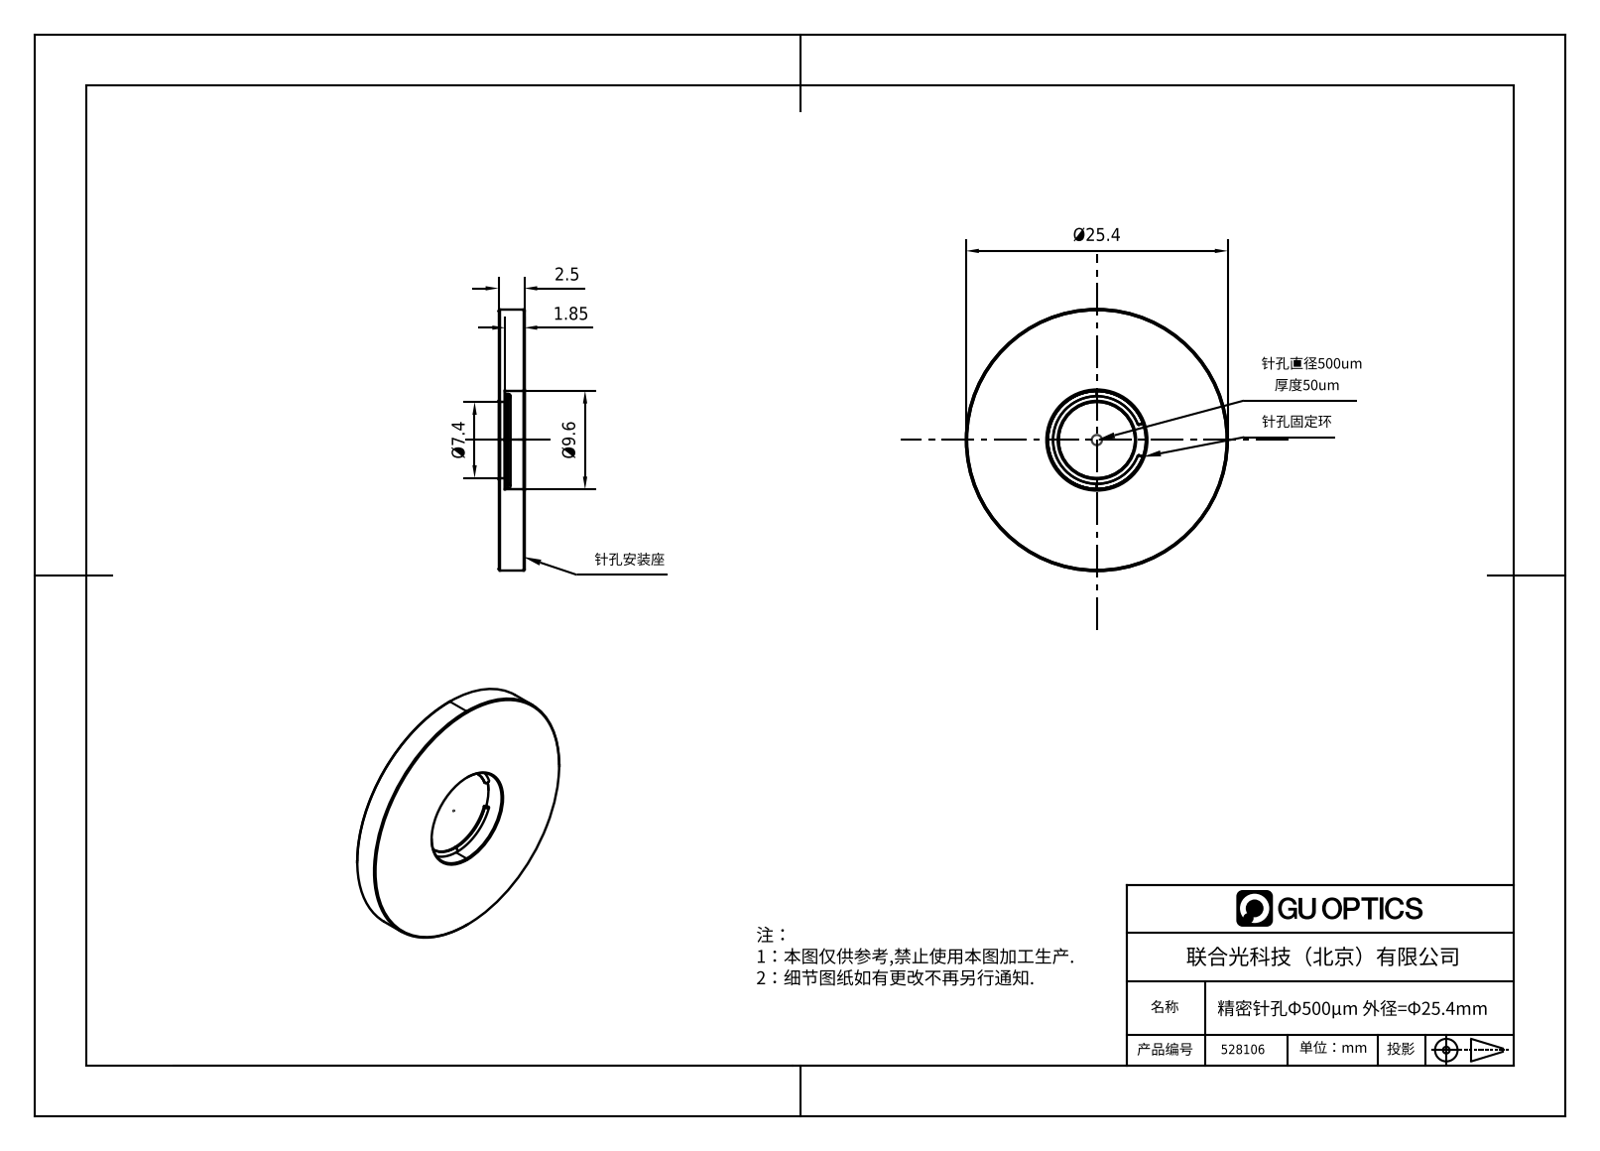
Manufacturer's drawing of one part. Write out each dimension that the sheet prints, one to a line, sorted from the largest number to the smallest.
Ø25.4
Ø9.6
Ø7.4
2.5
1.85
